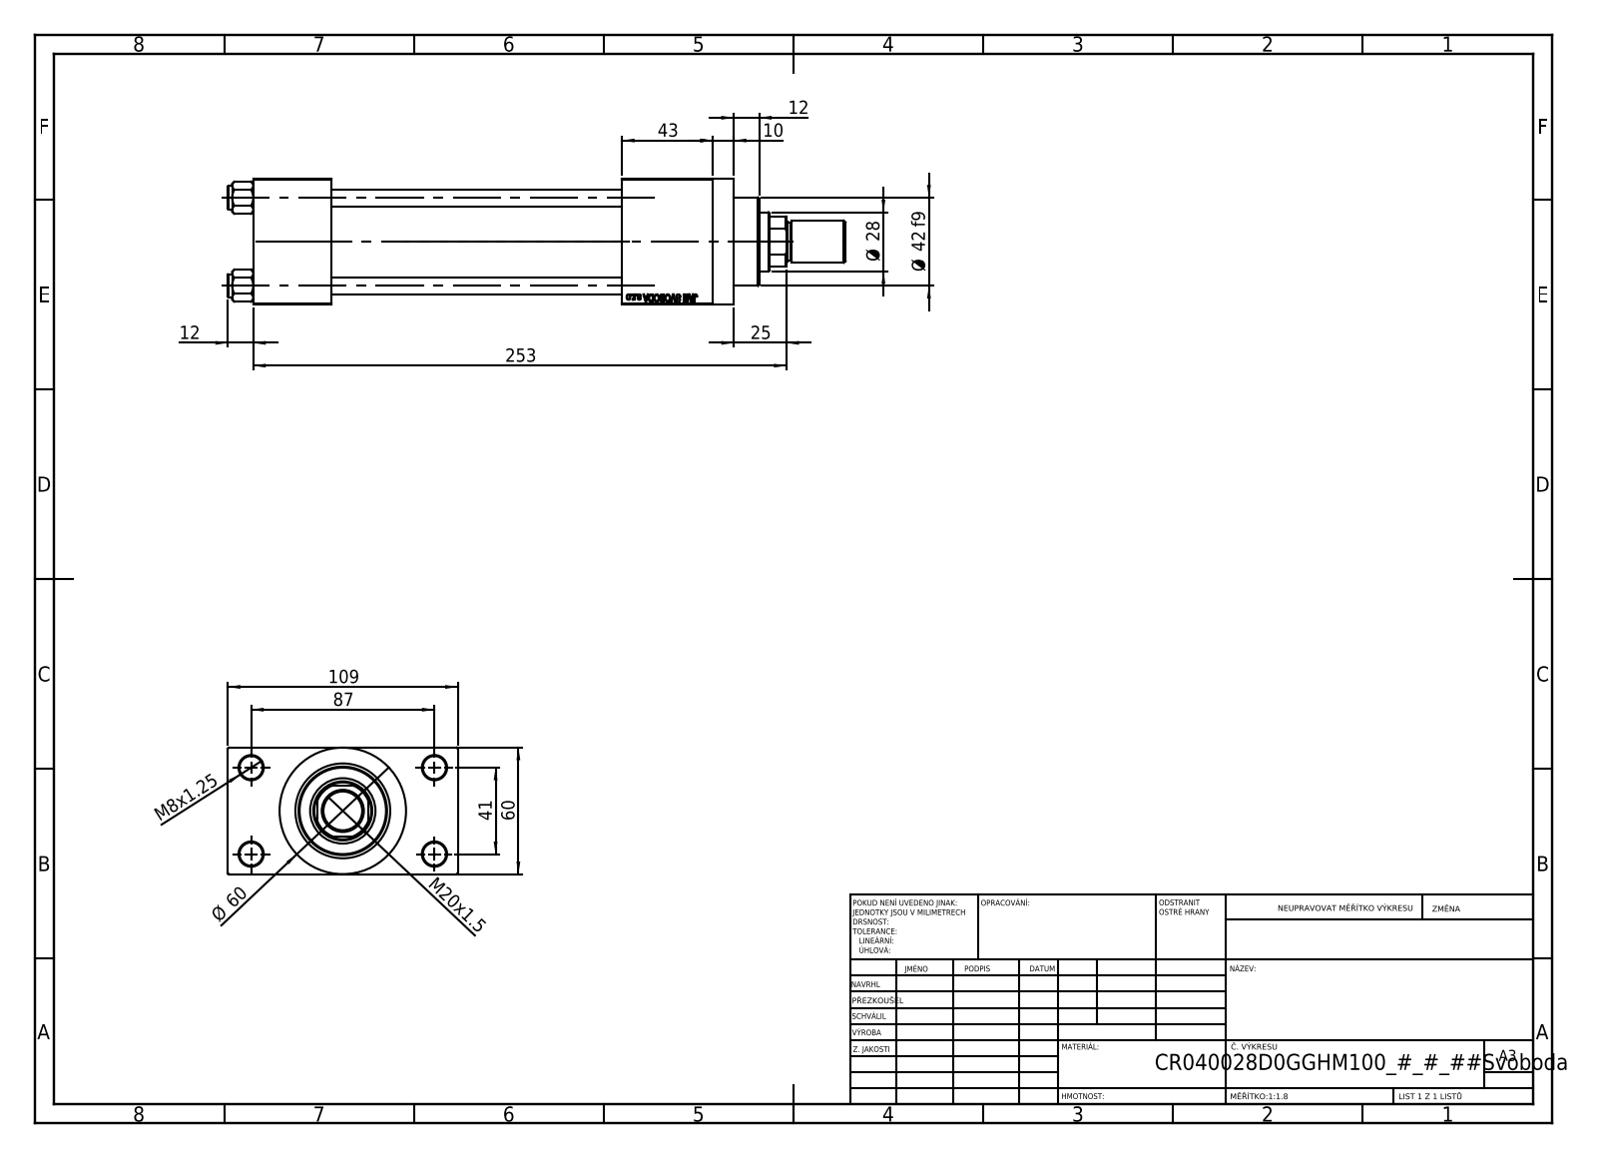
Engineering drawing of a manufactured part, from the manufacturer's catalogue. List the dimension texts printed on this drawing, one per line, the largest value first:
253
109
87
Ø 60
60
43
Ø 42 f9
41
Ø 28
25
M20x1.5
12
12
10
M8x1.25
